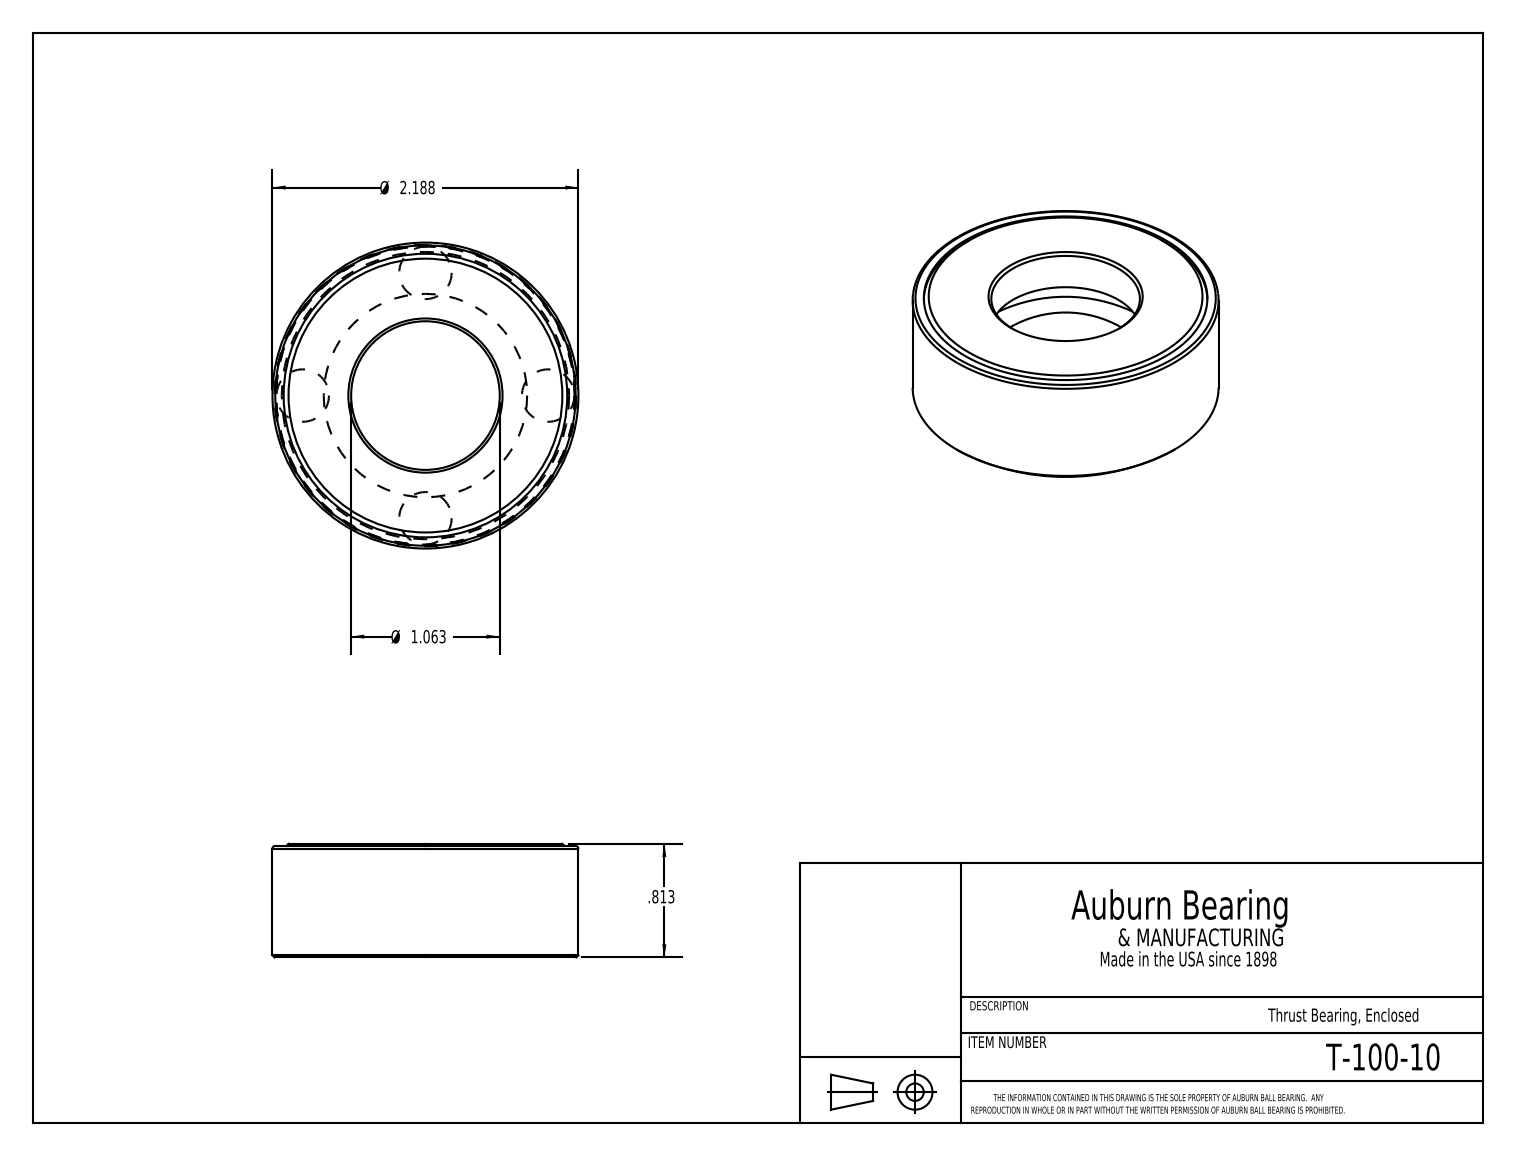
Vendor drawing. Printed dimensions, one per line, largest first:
Ø 2.188
Ø 1.063
.813
